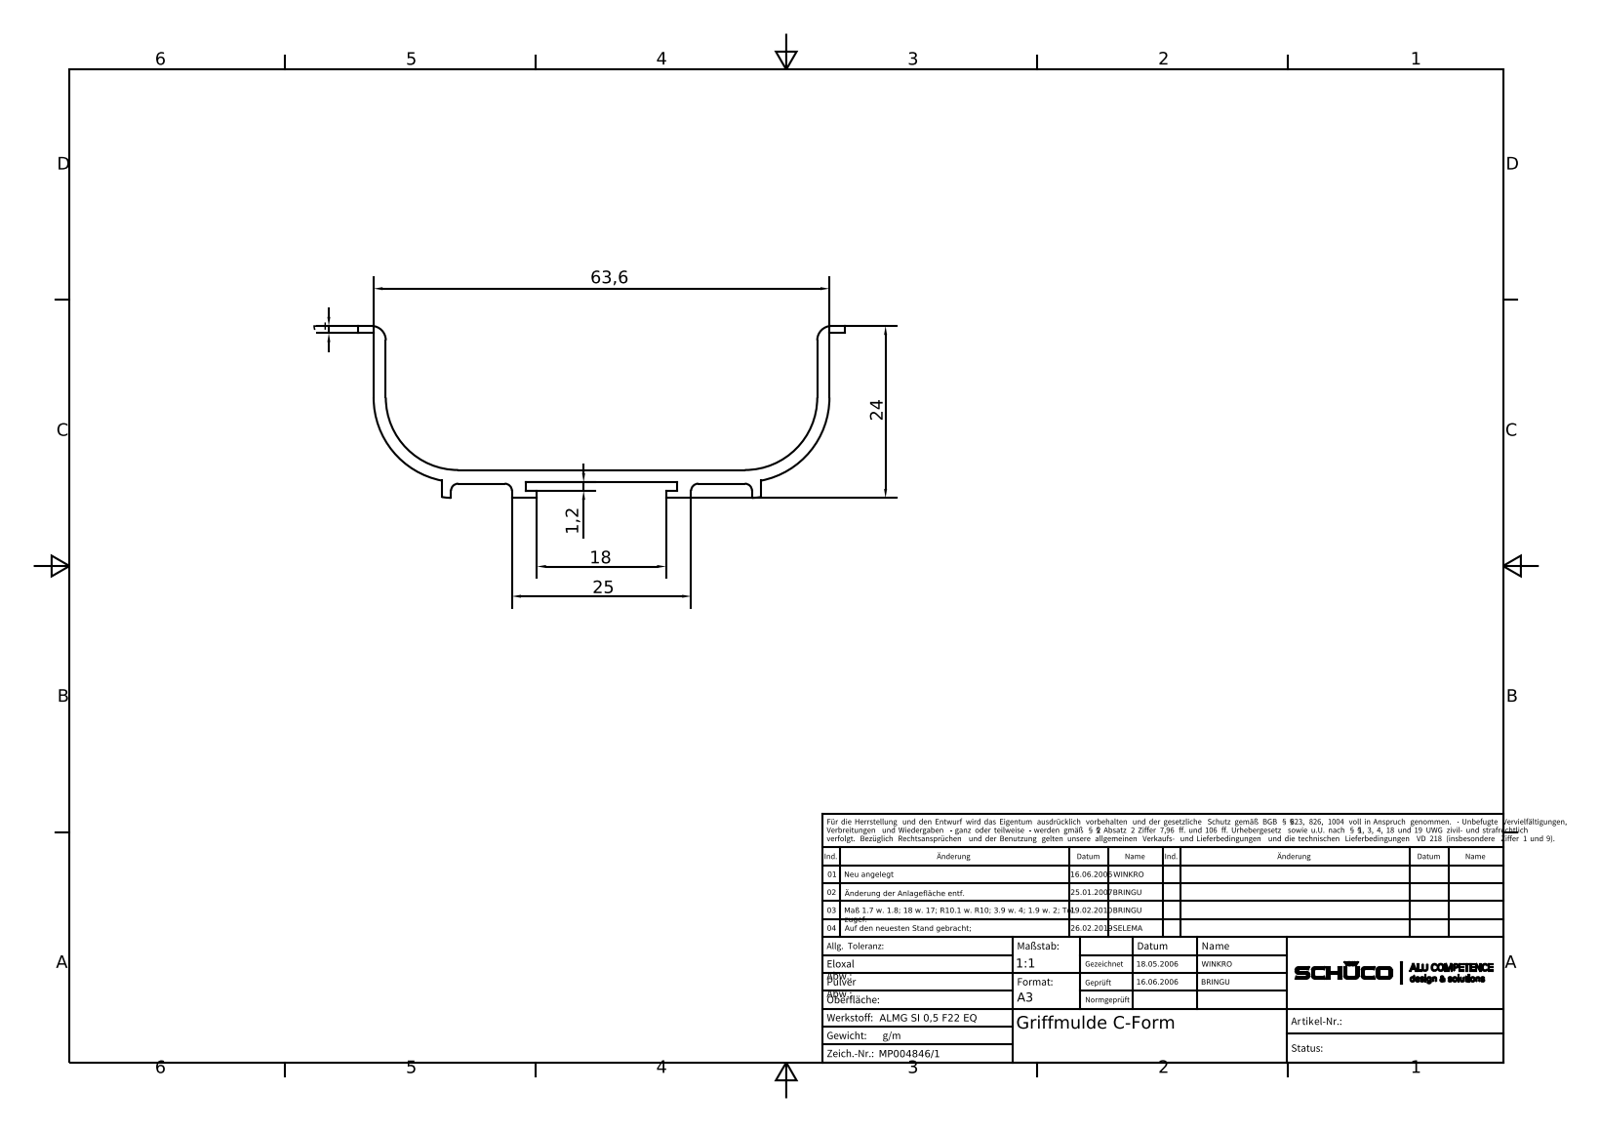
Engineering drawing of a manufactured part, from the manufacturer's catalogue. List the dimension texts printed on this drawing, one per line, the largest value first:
63,6
25
24
18
1,2
1
